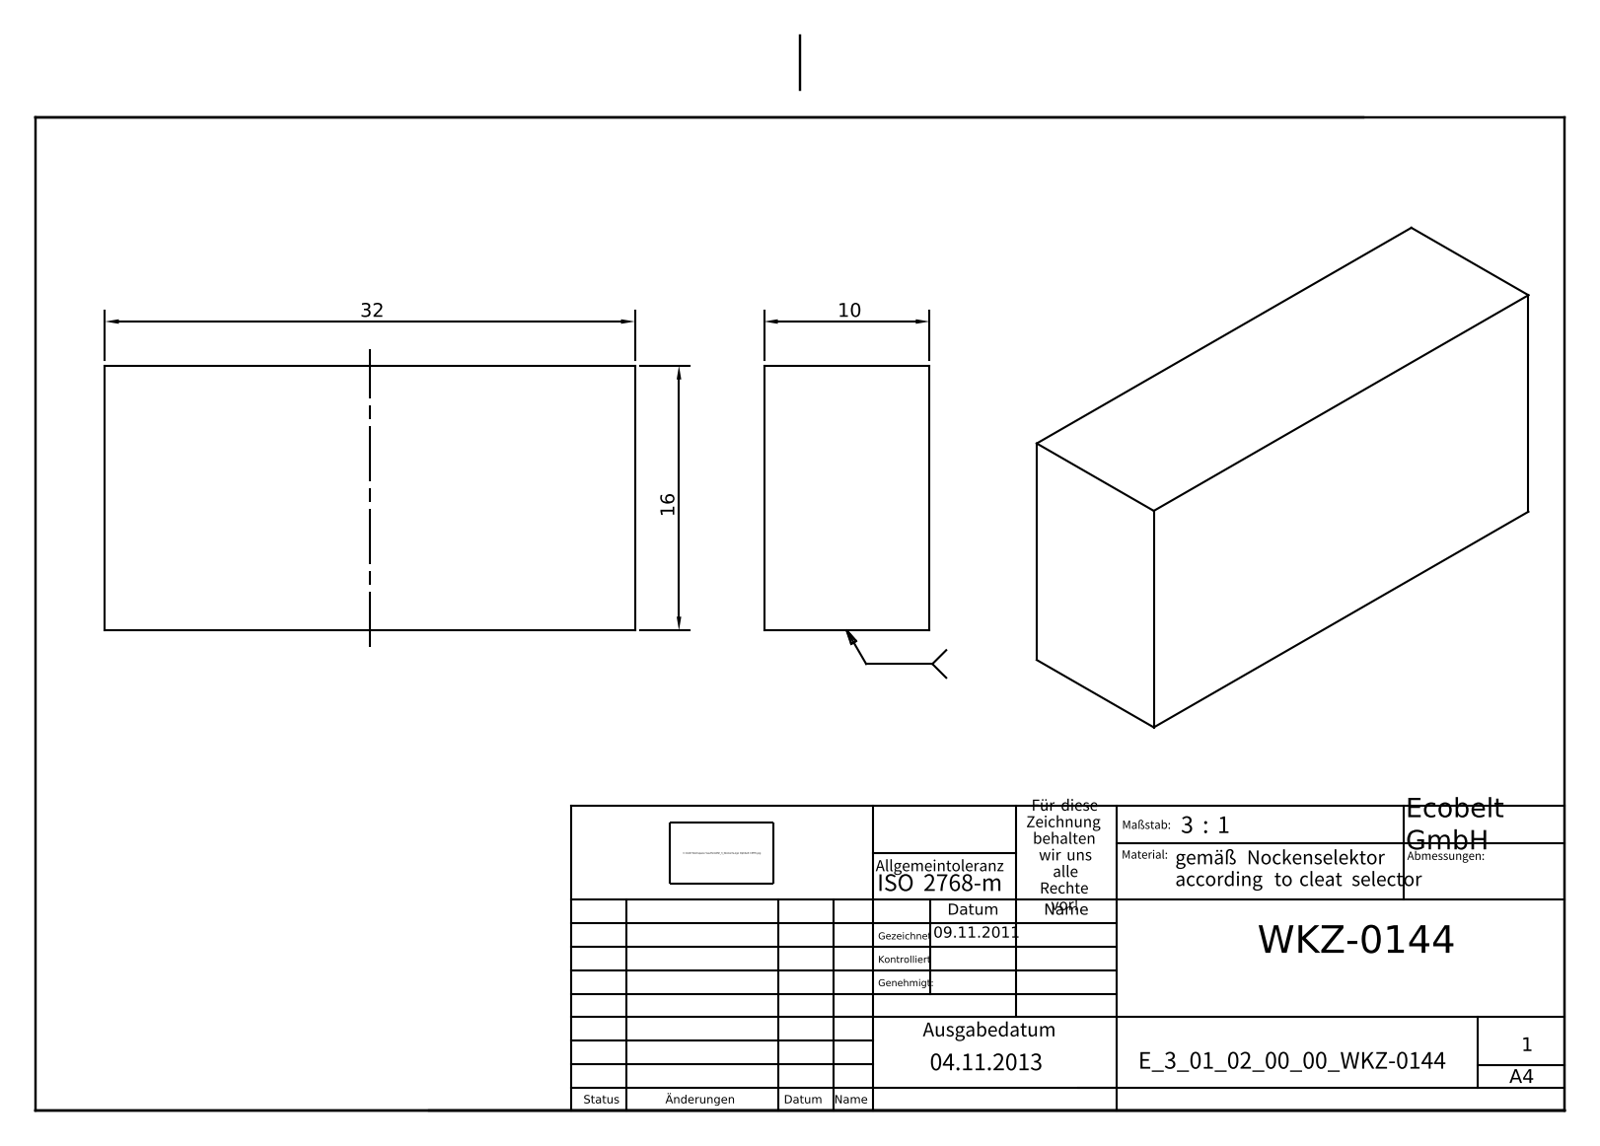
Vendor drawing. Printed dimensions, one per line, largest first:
32
16
10
